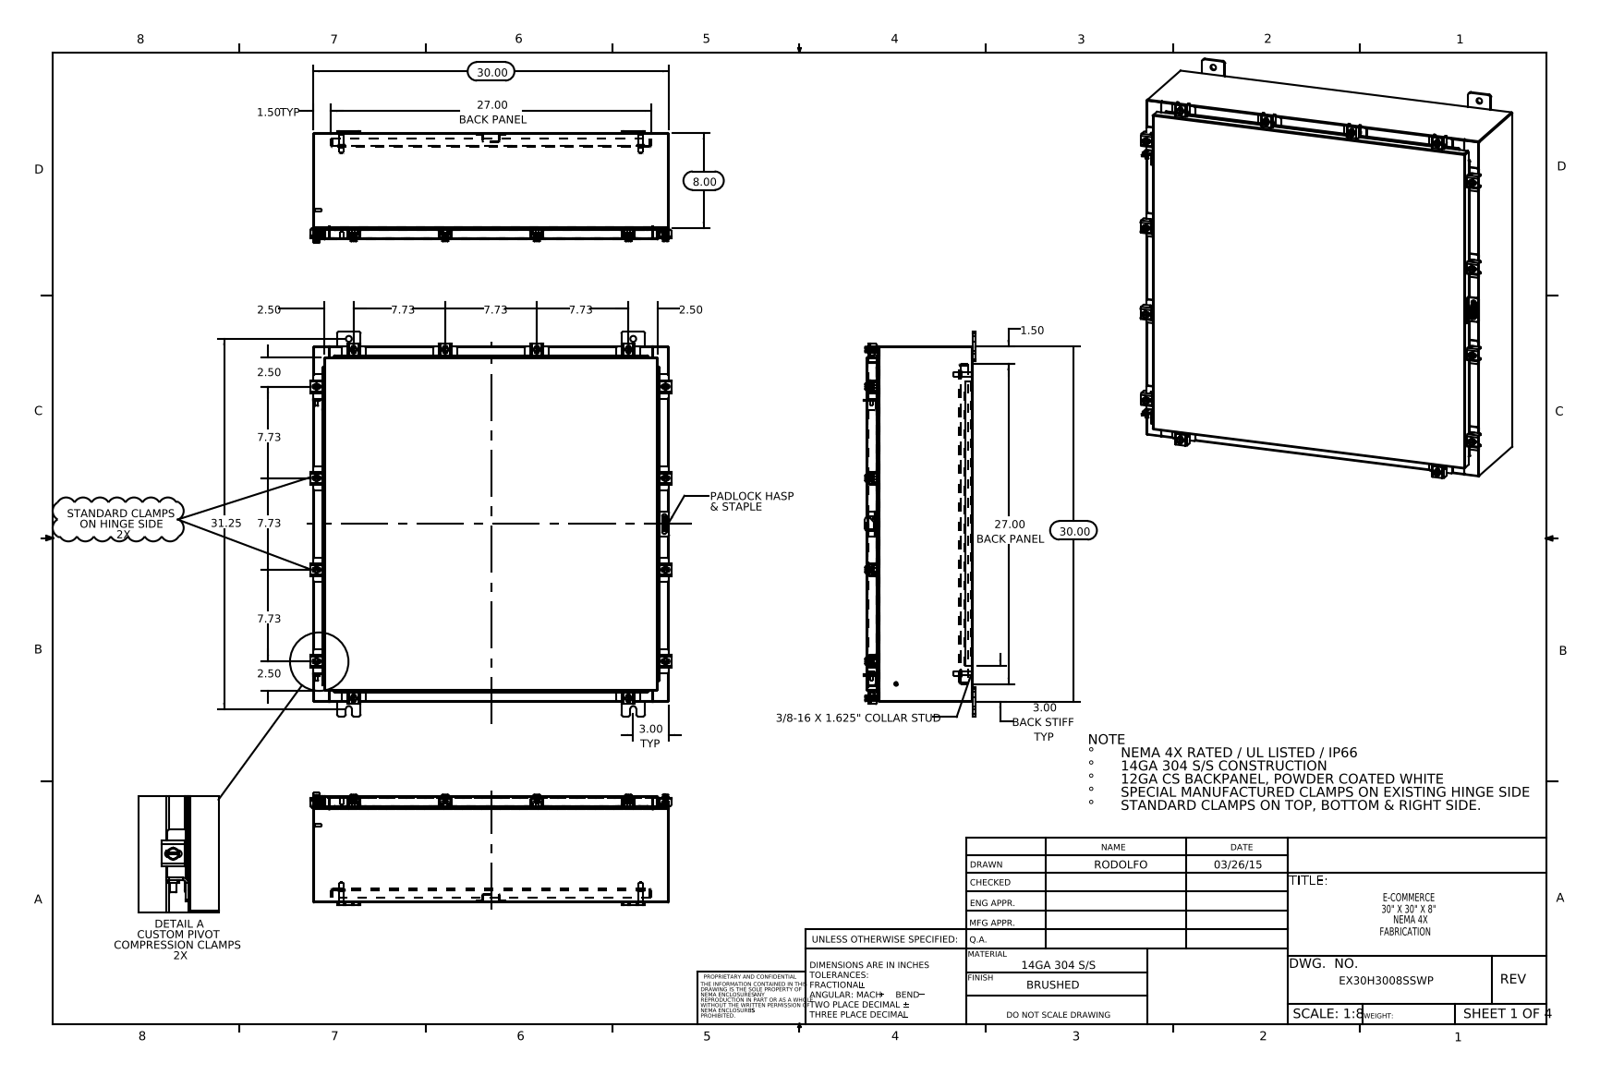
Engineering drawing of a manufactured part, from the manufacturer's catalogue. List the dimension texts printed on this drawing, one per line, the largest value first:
31.25
30.00
30.00
27.00 BACK PANEL
27.00 BACK PANEL
8.00
7.73
7.73
7.73
7.73
7.73
7.73
3.00 TYP
3.00 BACK STIFF TYP
2.50
2.50
2.50
2.50
1.50 TYP
1.50
